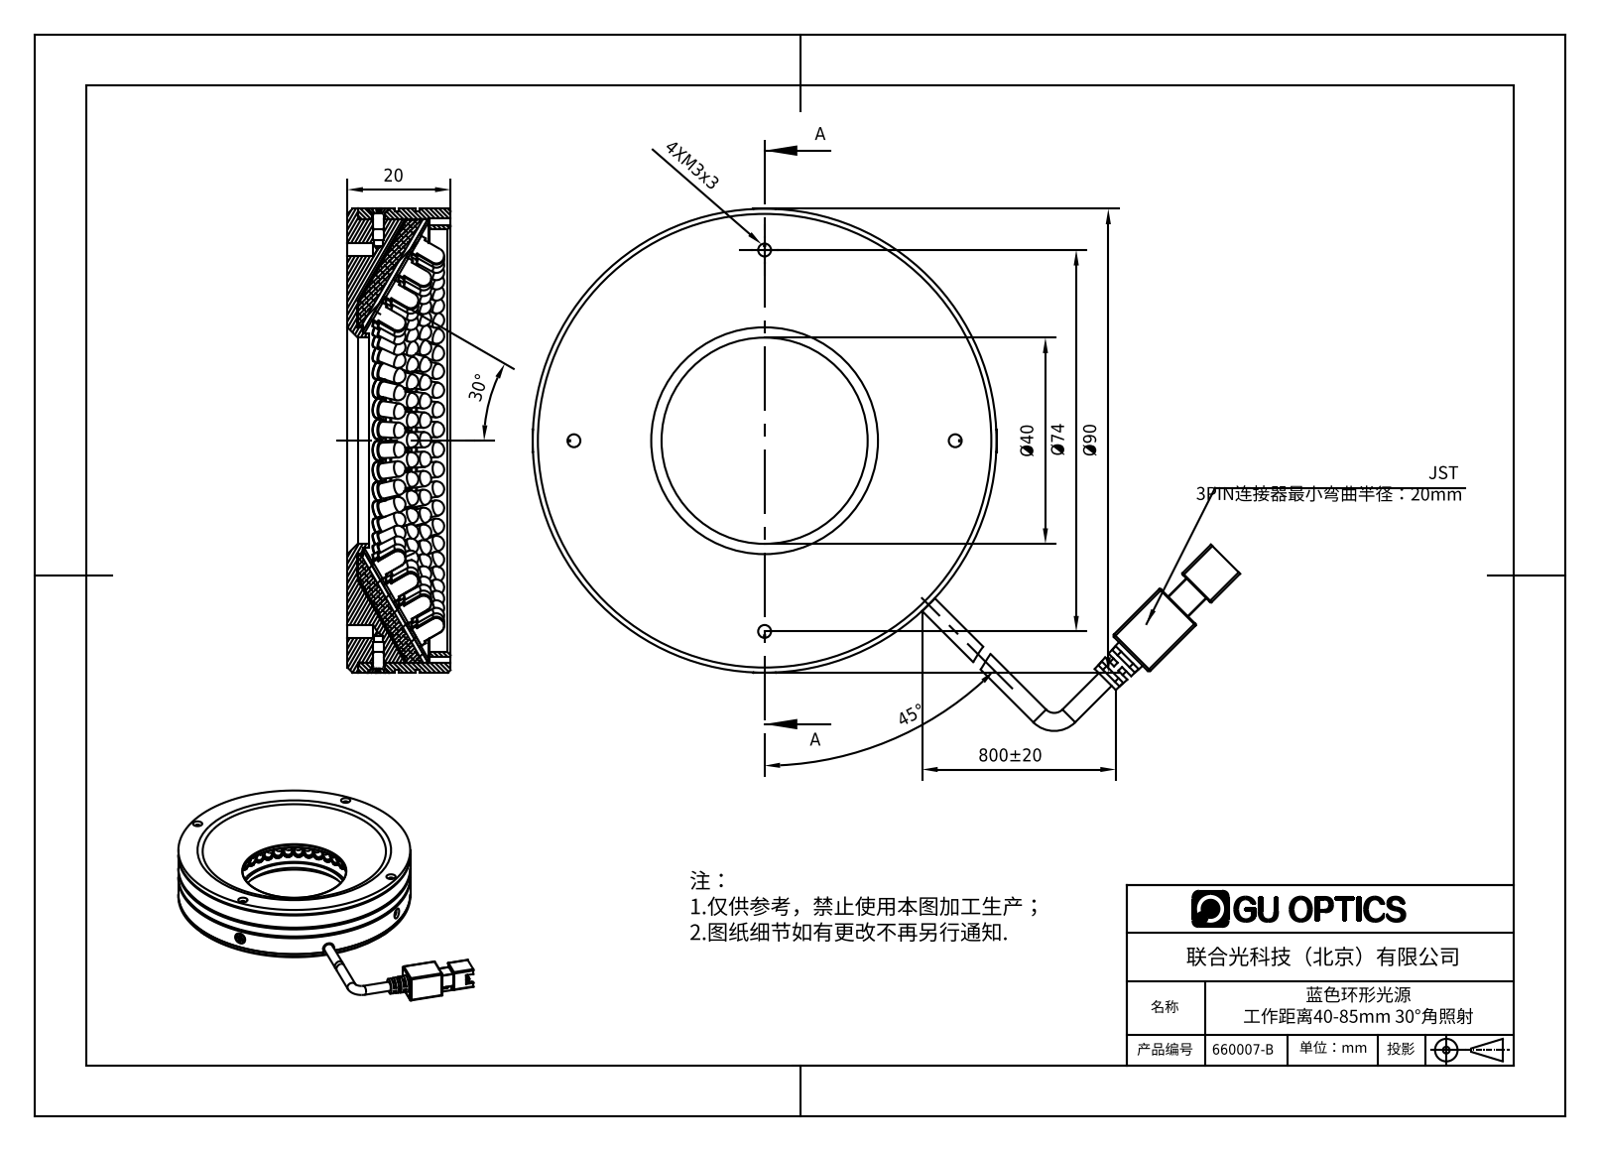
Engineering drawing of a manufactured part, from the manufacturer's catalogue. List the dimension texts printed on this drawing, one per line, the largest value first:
800±20
Ø90
Ø74
45°
Ø40
30°
20
4XM3x3
